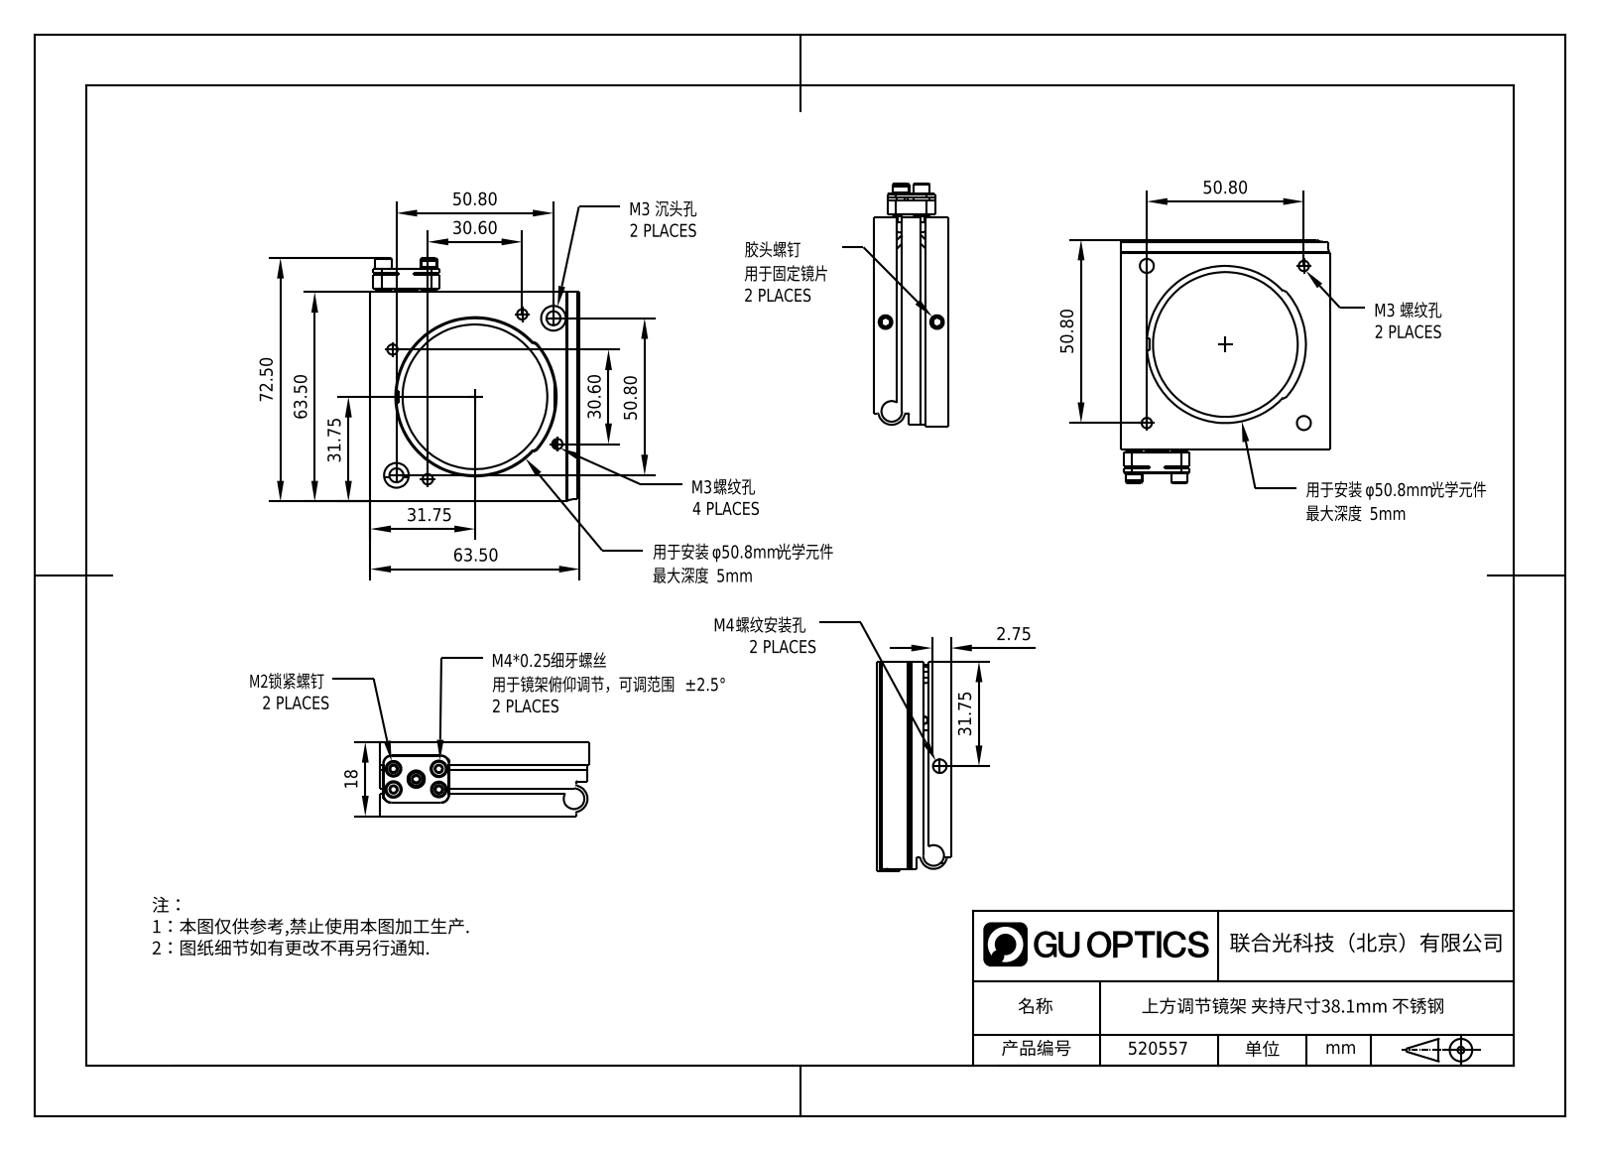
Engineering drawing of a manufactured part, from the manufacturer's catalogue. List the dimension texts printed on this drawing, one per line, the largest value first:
72.50
63.50
63.50
50.80
50.80
50.80
50.80
31.75
31.75
31.75
30.60
30.60
18
2.75
